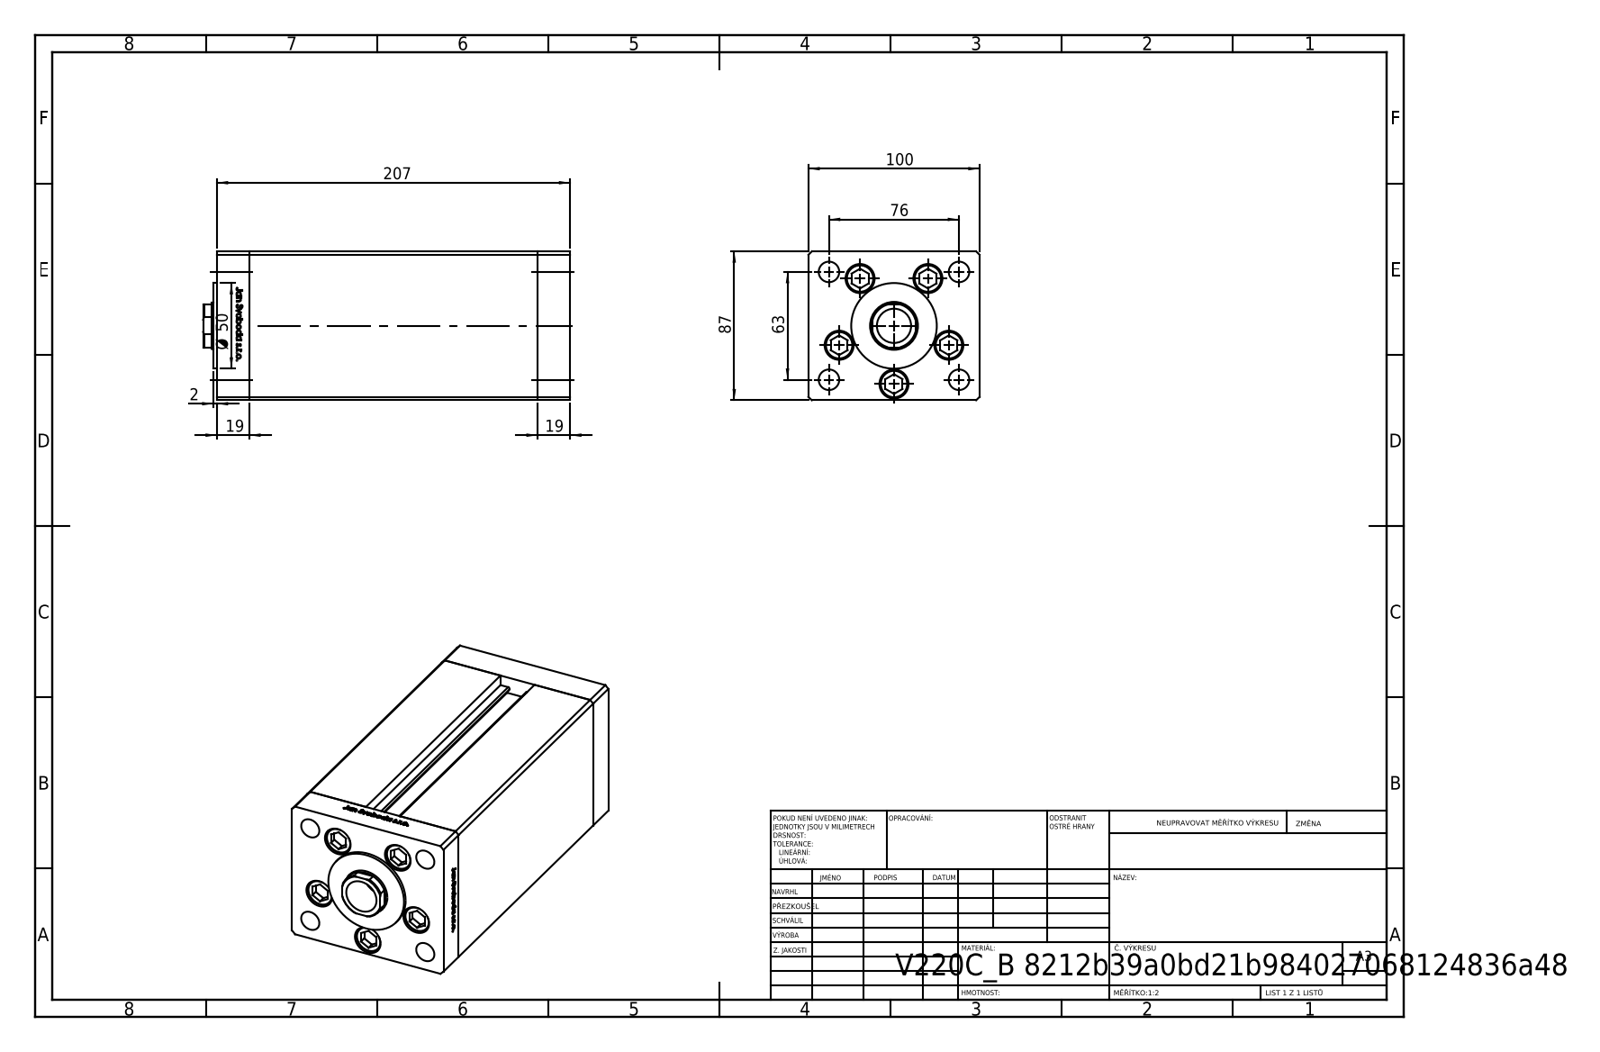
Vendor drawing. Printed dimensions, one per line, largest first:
207
100
87
76
63
Ø 50
19
19
2
